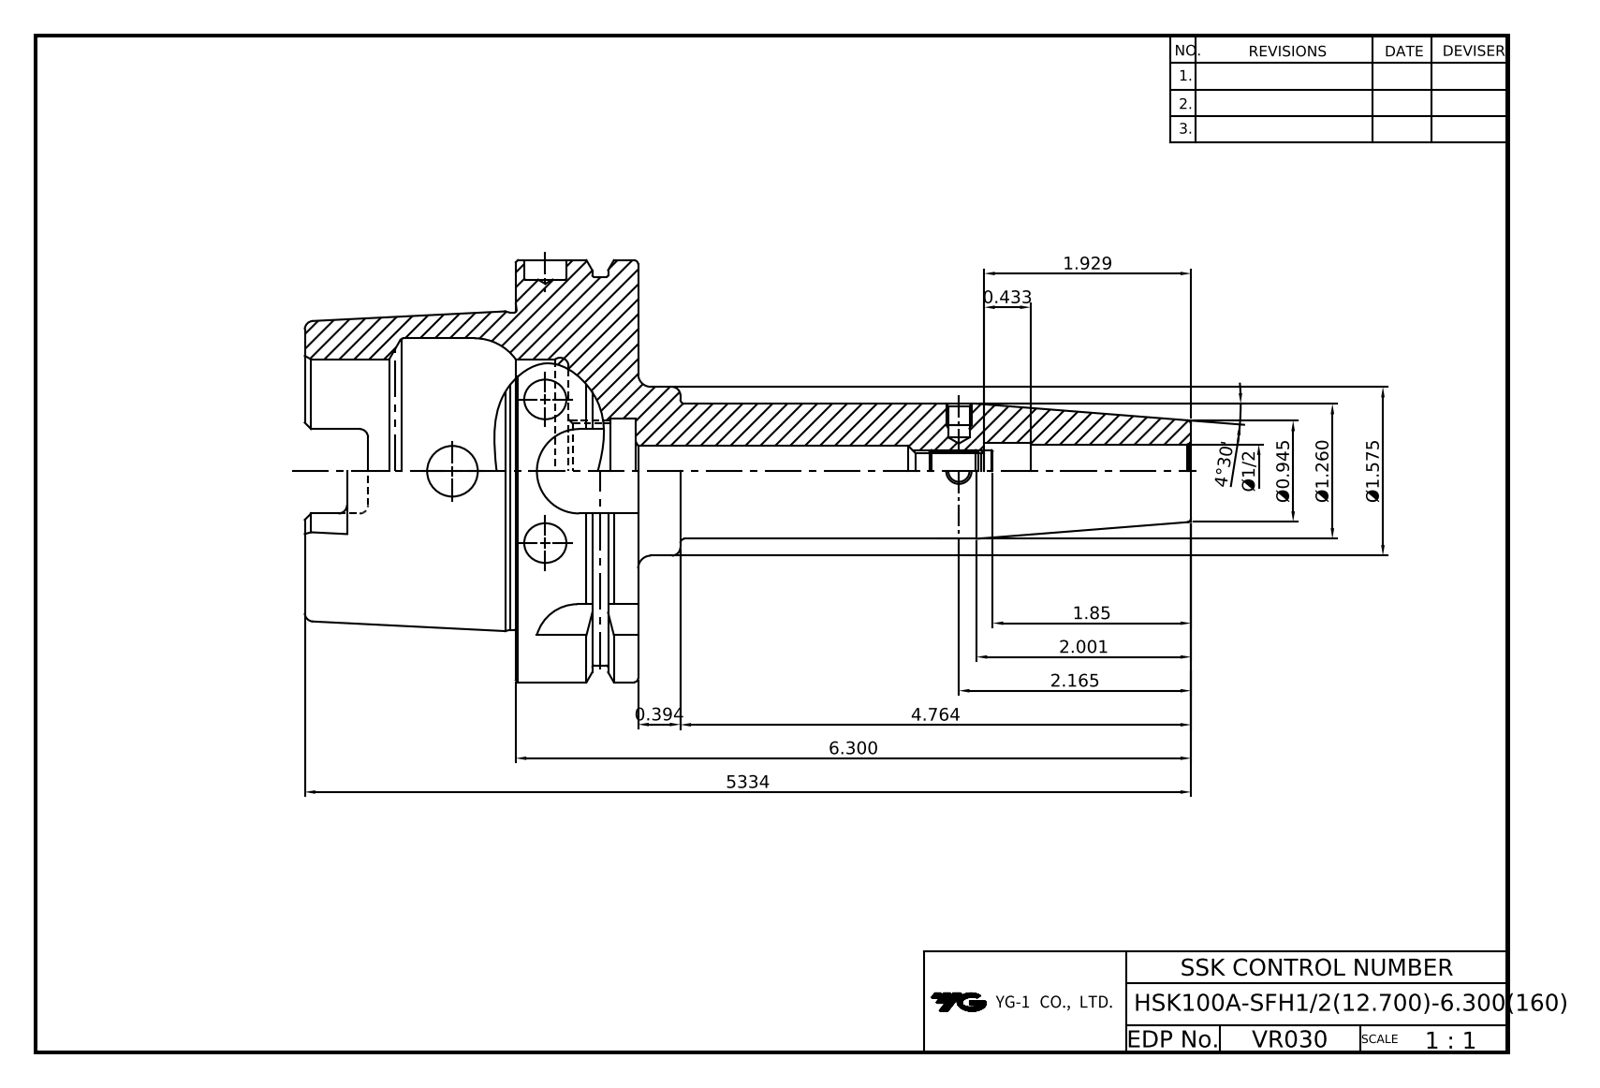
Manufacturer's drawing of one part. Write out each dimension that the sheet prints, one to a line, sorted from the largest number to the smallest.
5334
6.300
4.764
4°30'
2.165
2.001
1.929
1.85
Ø1.575
Ø1.260
Ø0.945
0.433
0.394
